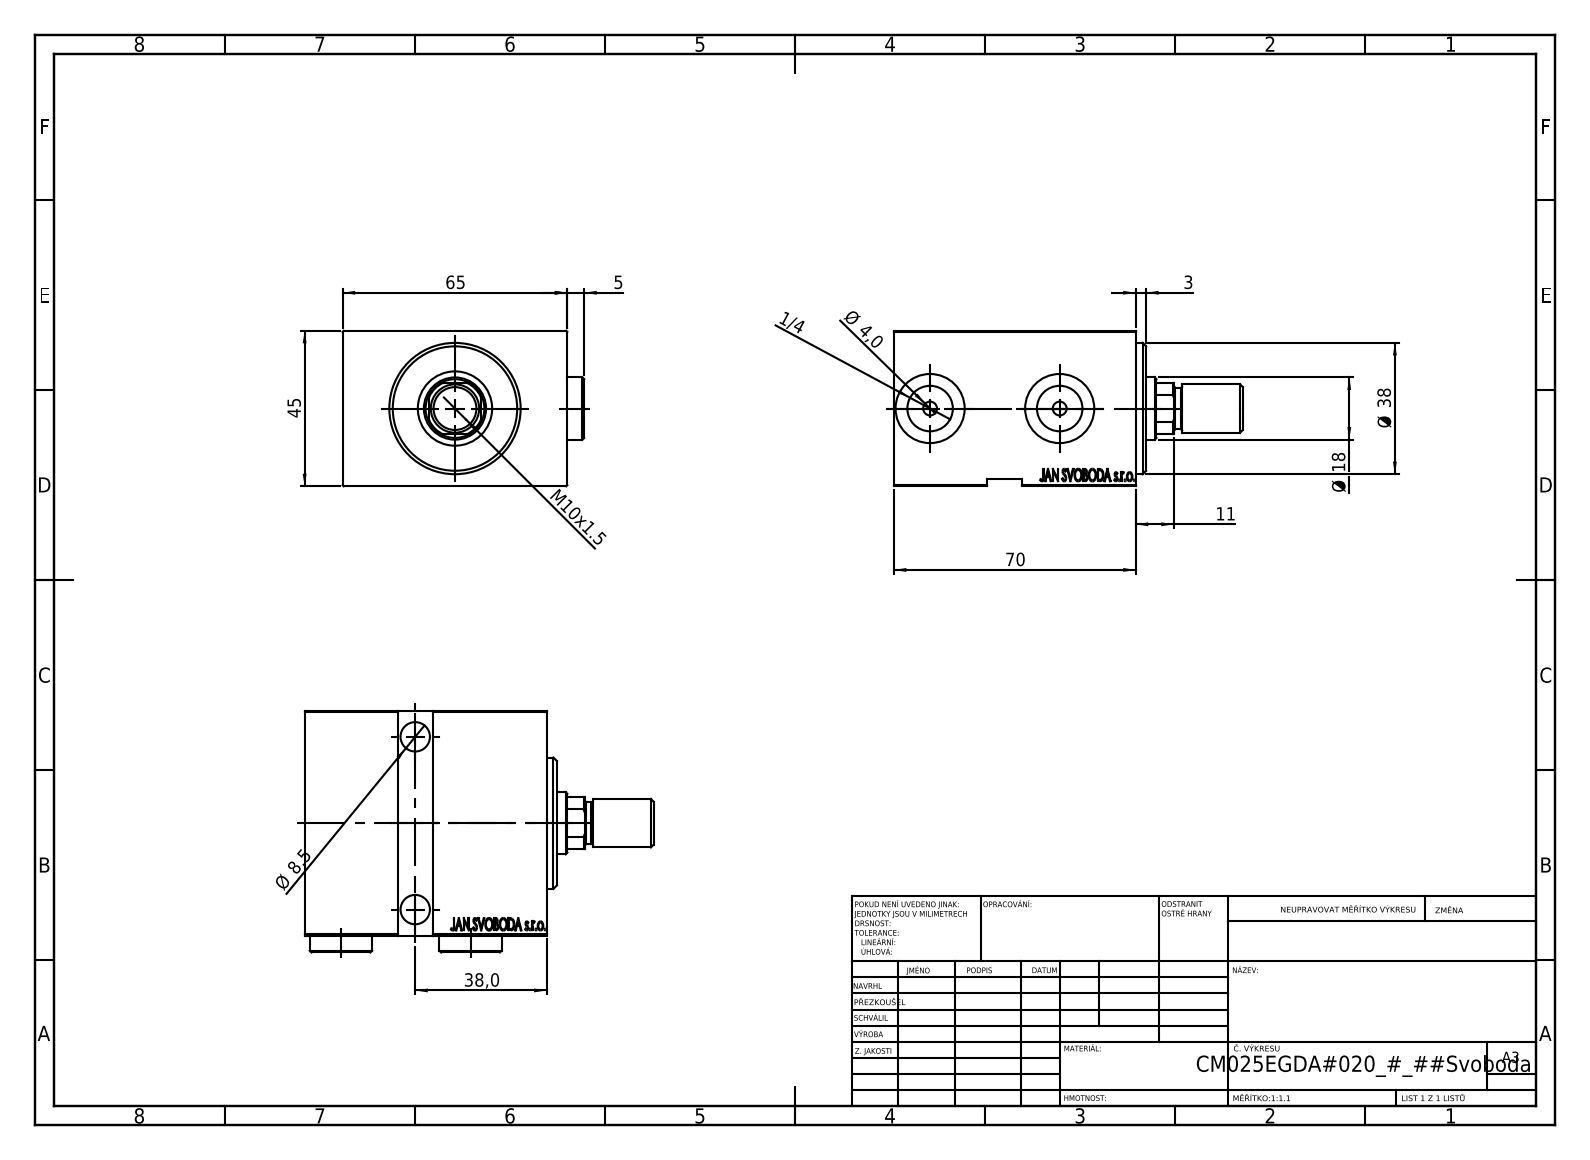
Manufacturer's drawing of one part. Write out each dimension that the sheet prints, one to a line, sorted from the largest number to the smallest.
70
65
45
Ø 38
38,0
Ø 18
11
M10x1.5
Ø 8,5
5
Ø 4,0
3
1/4
